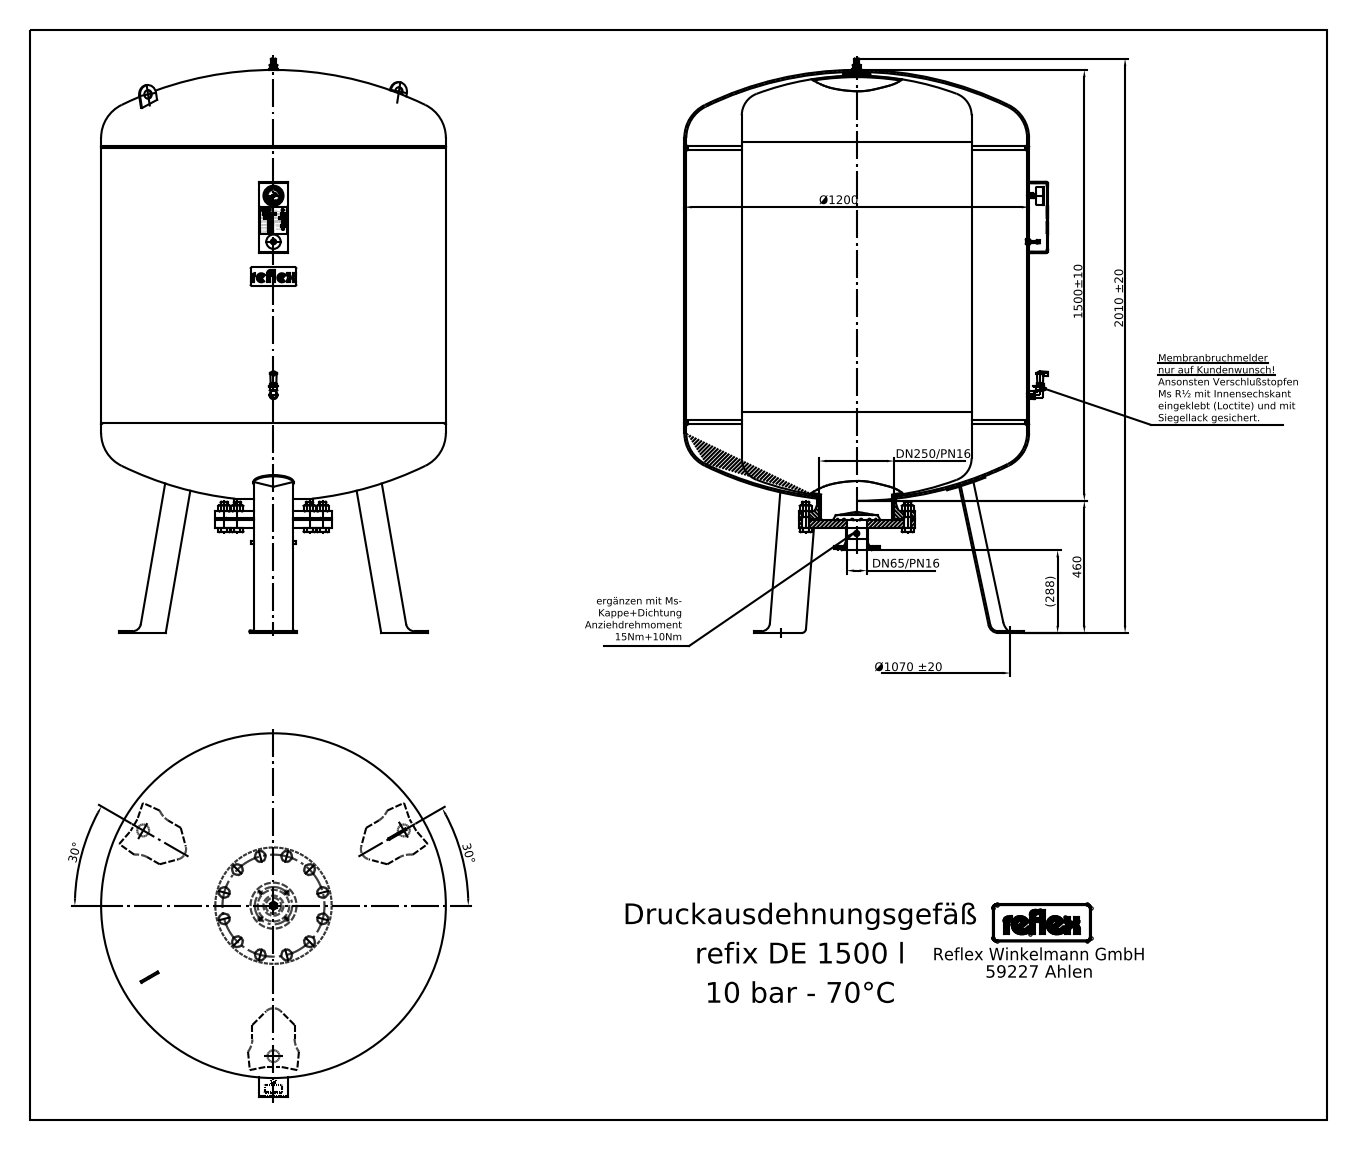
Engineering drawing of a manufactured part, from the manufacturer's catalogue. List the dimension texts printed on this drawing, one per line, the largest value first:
2010 ±20
1500±10
Ø1200
Ø1070 ±20
460
(288)
DN250/PN16
DN65/PN16
30°
30°
